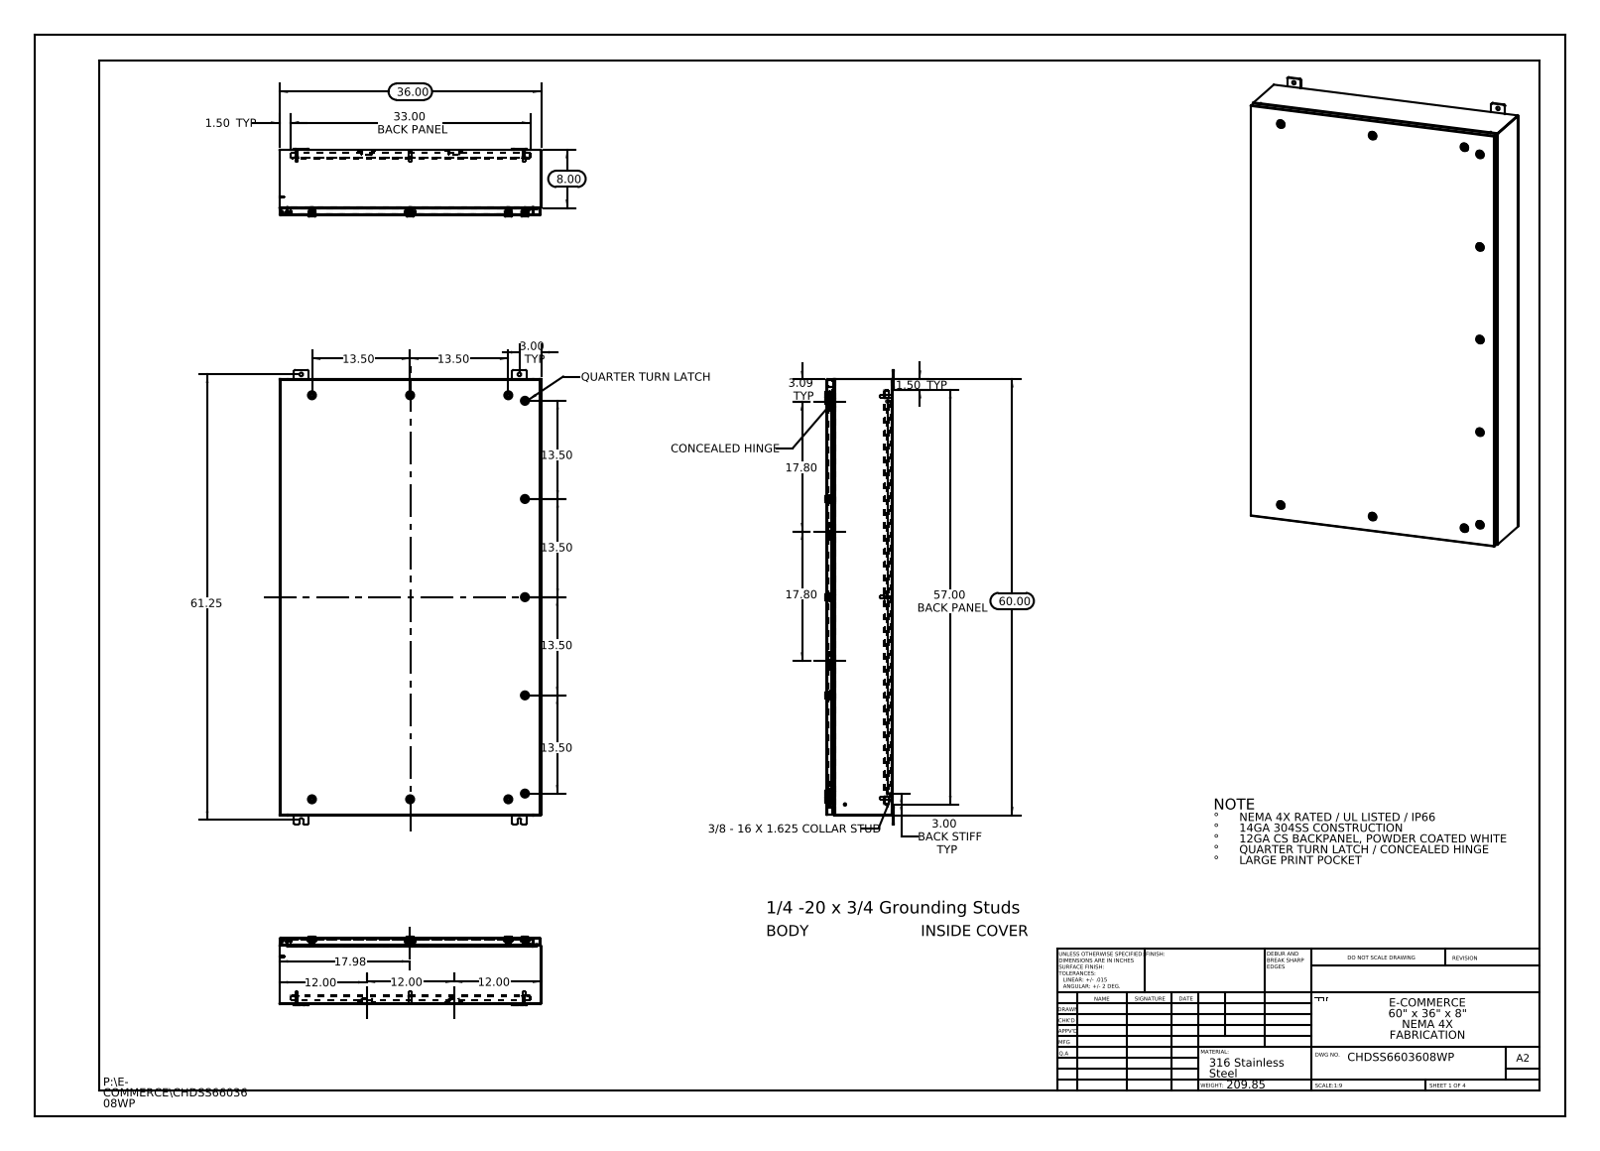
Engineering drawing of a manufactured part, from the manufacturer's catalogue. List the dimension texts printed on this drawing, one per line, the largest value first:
61.25
60.00
57.00 BACK PANEL
36.00
33.00 BACK PANEL
17.98
17.80
17.80
13.50
13.50
13.50
13.50
13.50
13.50
12.00
12.00
12.00
8.00
3.09 TYP
3.00 TYP
3.00 BACK STIFF TYP
1.50 TYP
1.50 TYP
